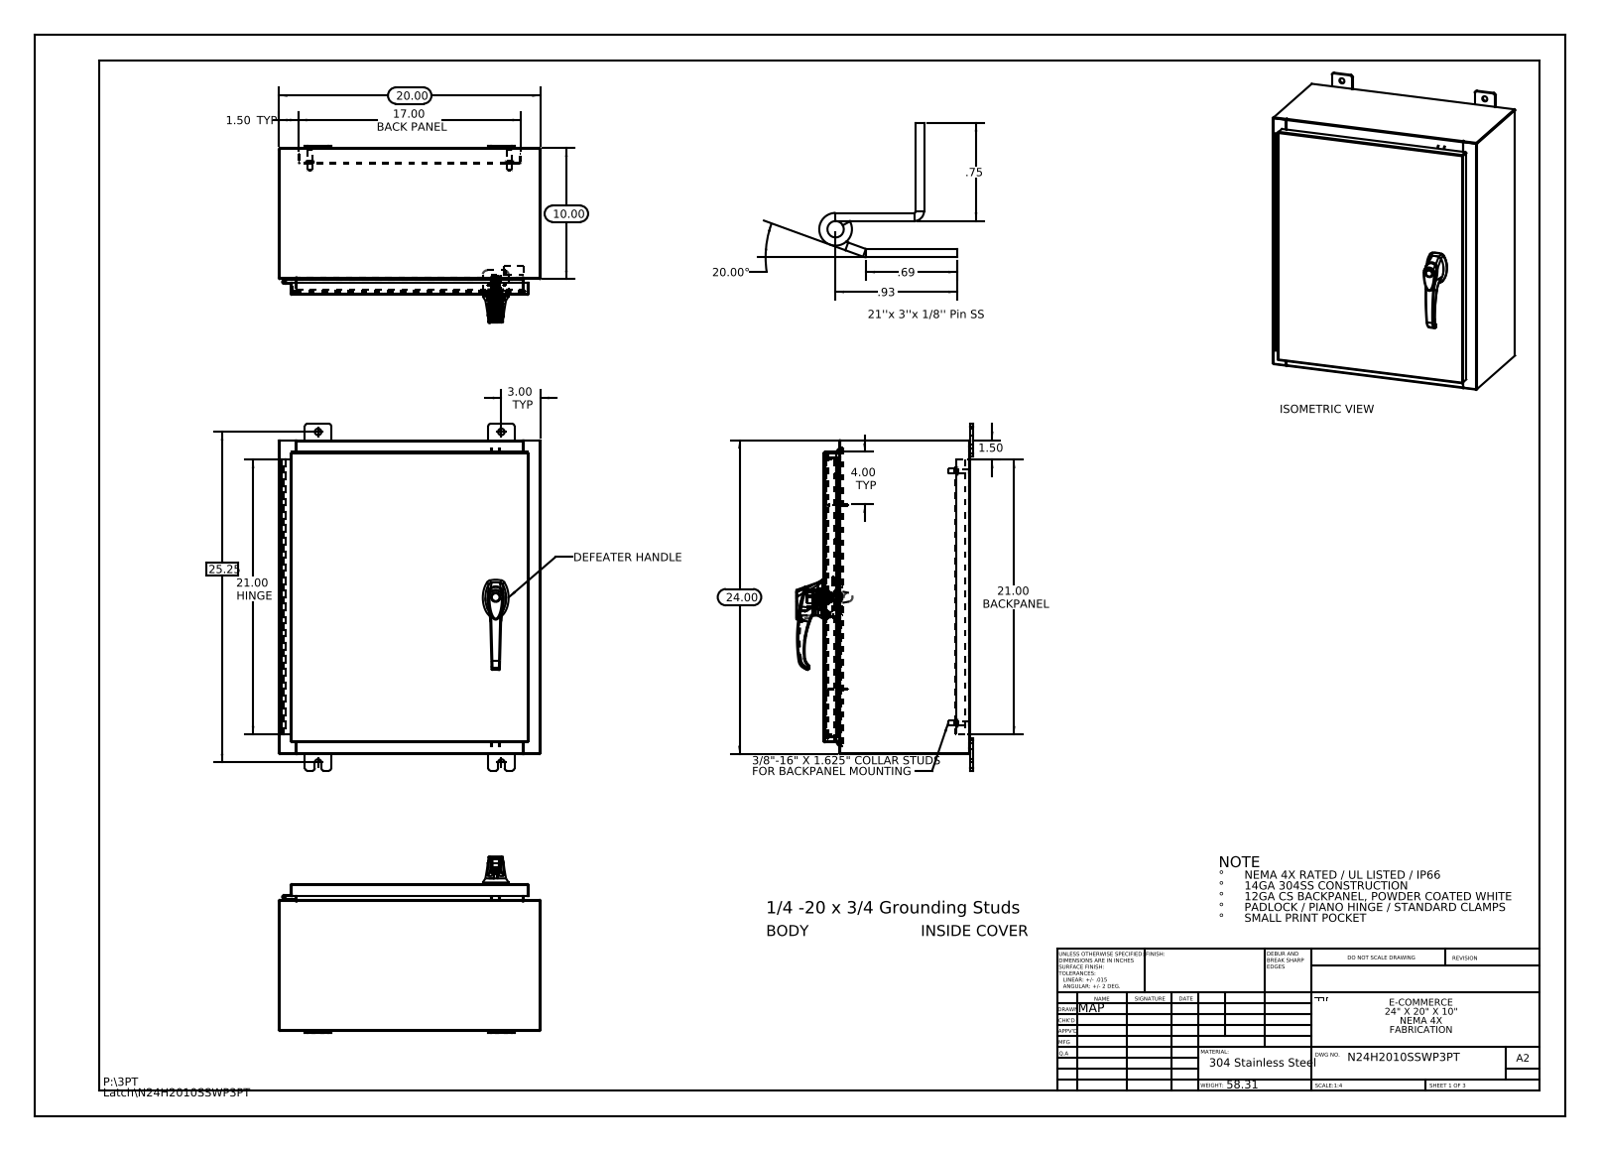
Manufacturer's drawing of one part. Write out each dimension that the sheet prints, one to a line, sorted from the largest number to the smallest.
25.25
24.00
21.00 HINGE
21.00 BACKPANEL
20.00
20.00°
17.00 BACK PANEL
10.00
4.00 TYP
3.00 TYP
1.50 TYP
1.50
.93
.75
.69
